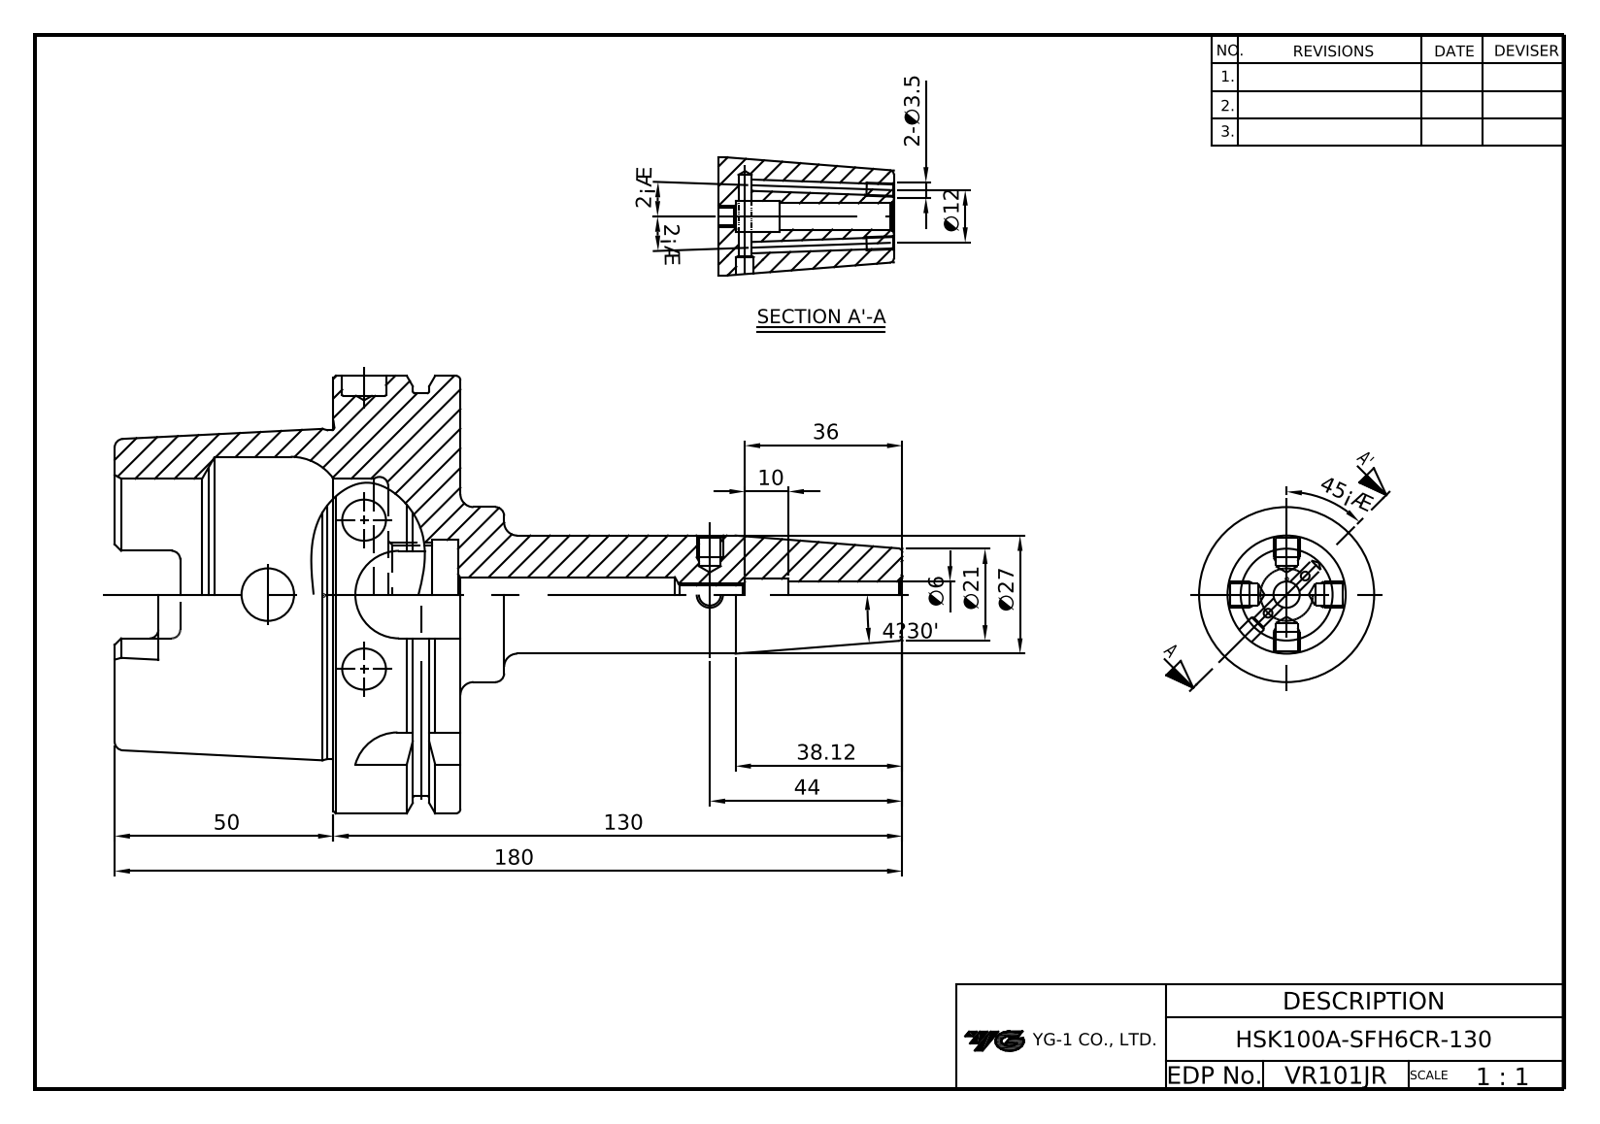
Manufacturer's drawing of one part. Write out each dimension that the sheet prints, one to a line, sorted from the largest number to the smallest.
358.00
358.00
225.00
180.00
130.00
50.00
44.00
38.12
36.00
27.00
21.00
12.00
10.00
6.00
4?30'
3.50
